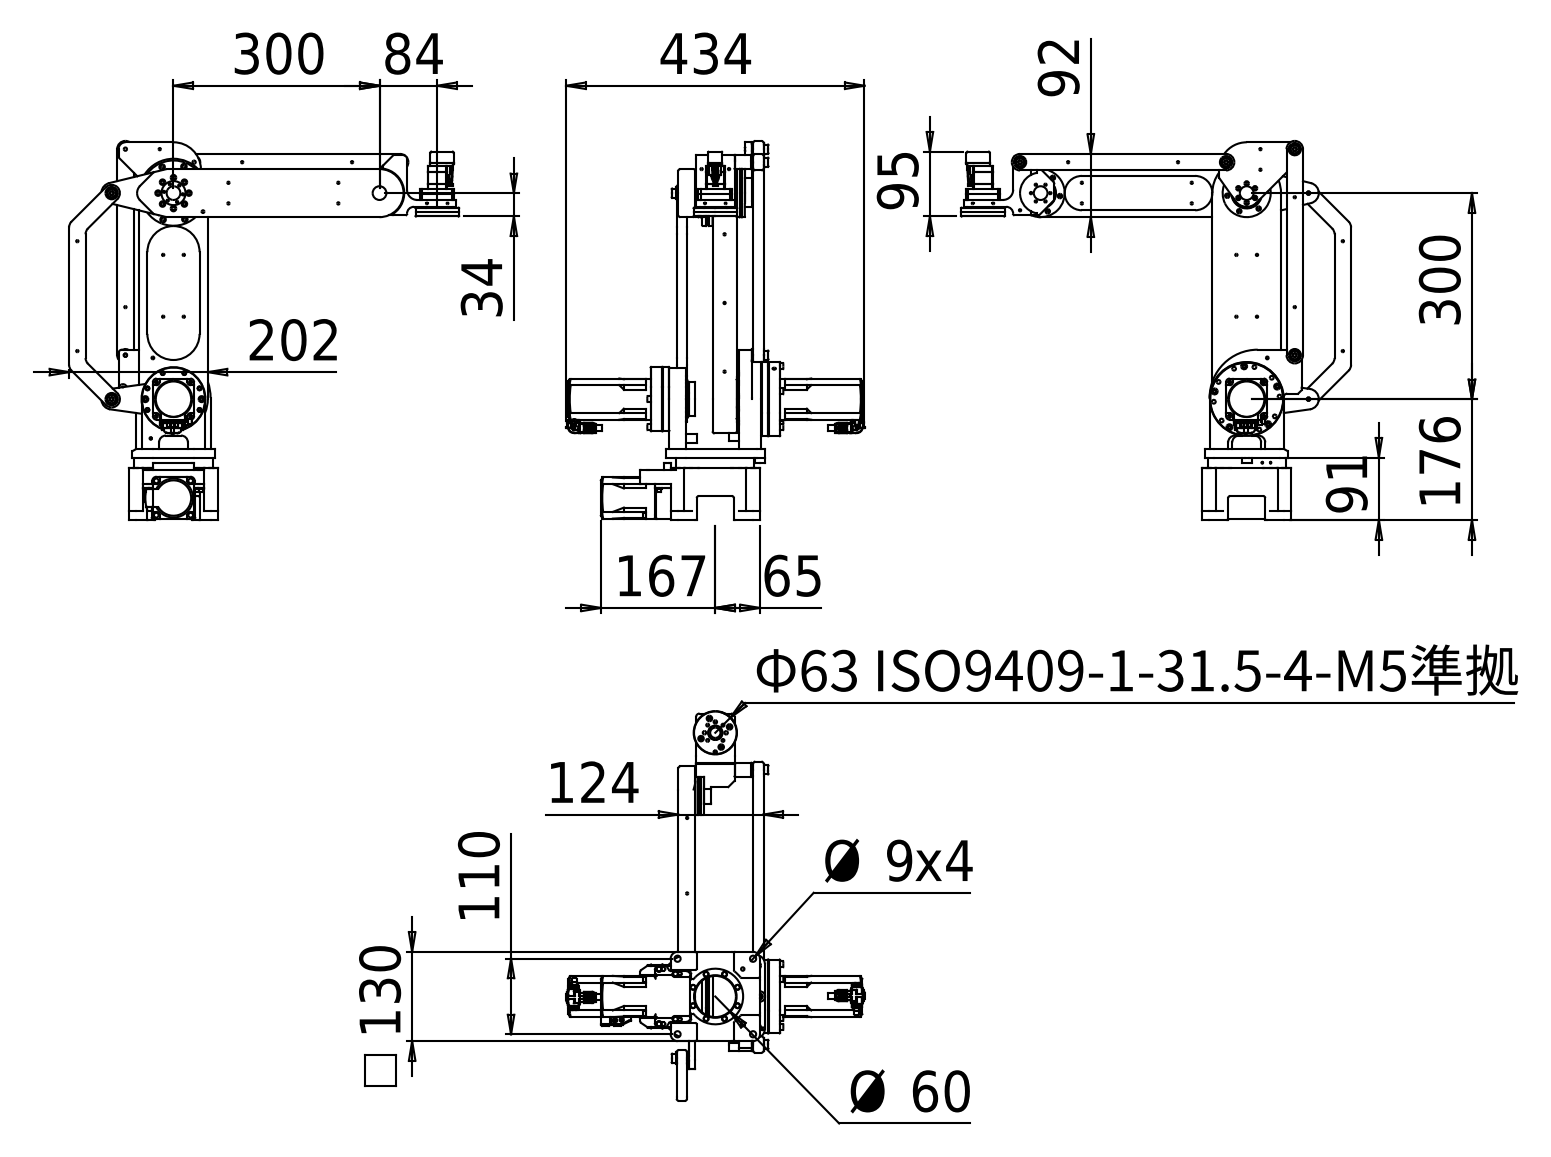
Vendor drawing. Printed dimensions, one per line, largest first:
434
300
300
202
176
167
130
124
110
95
92
91
84
65
Φ63 ISO9409-1-31.5-4-M5準拠
Ø 60
34
Ø 9 x4
